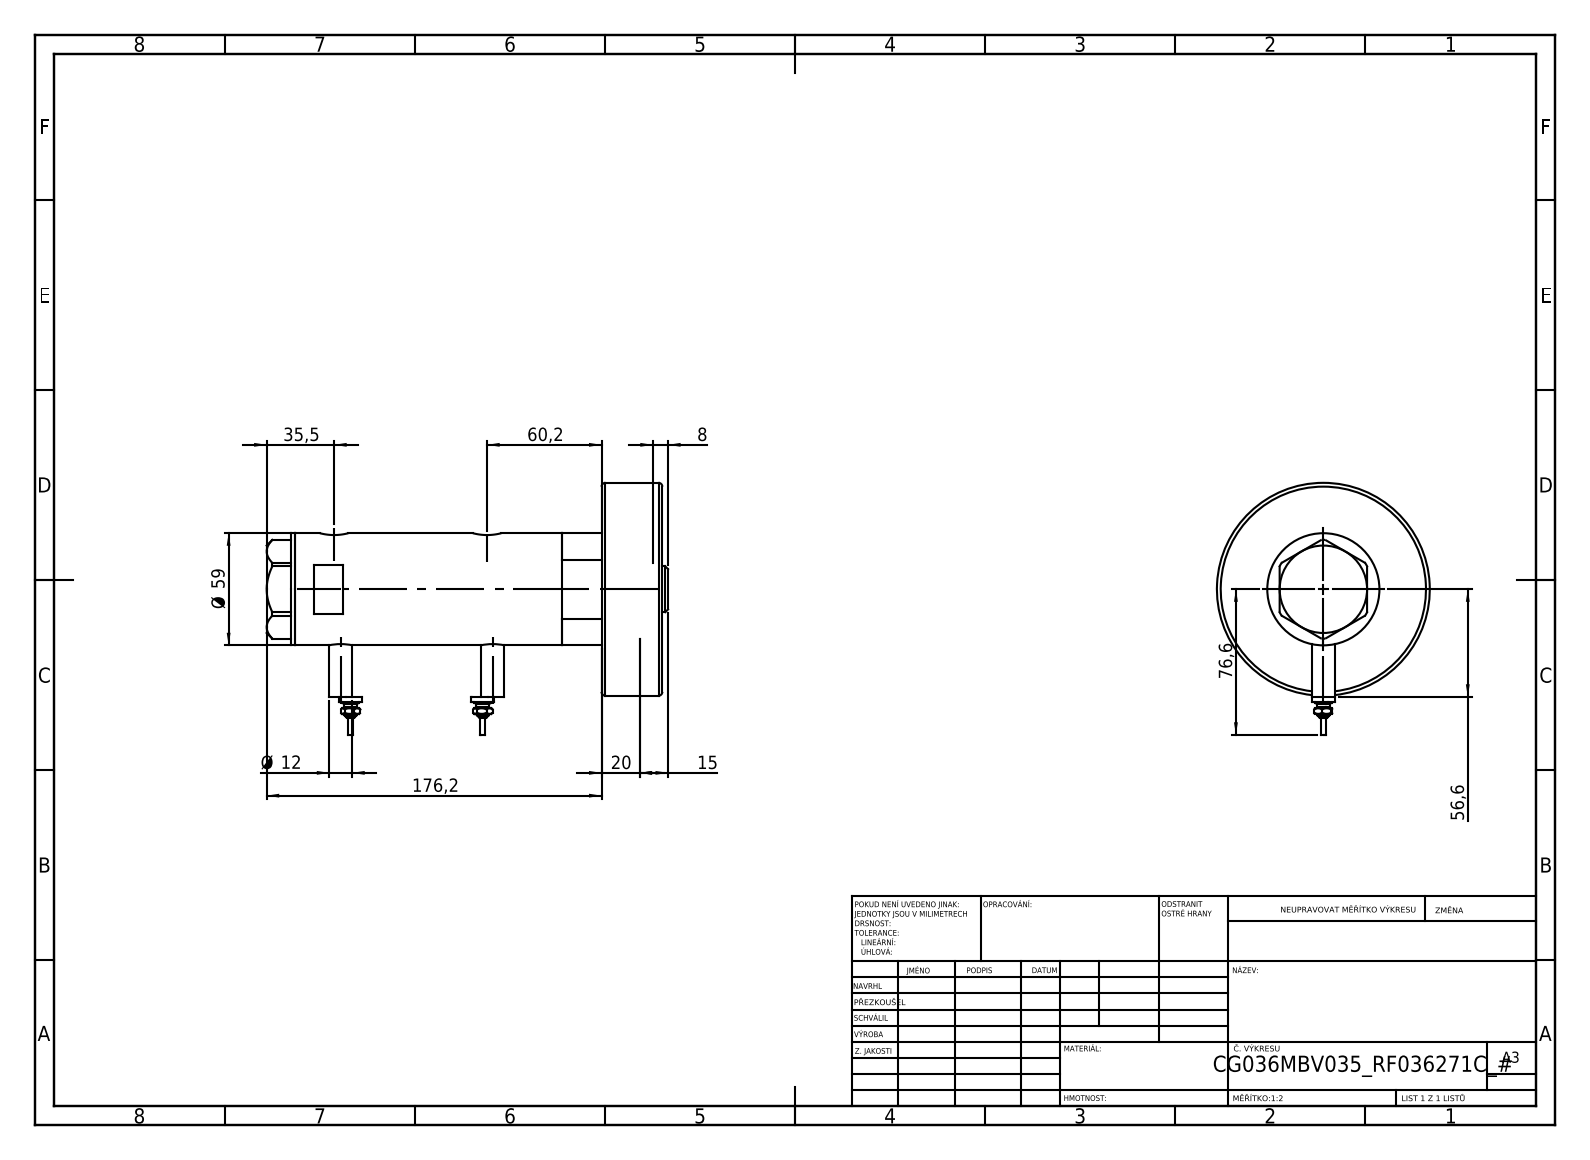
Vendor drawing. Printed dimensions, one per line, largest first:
176,2
76,6
60,2
Ø 59
56,6
35,5
20
15
Ø 12
8
